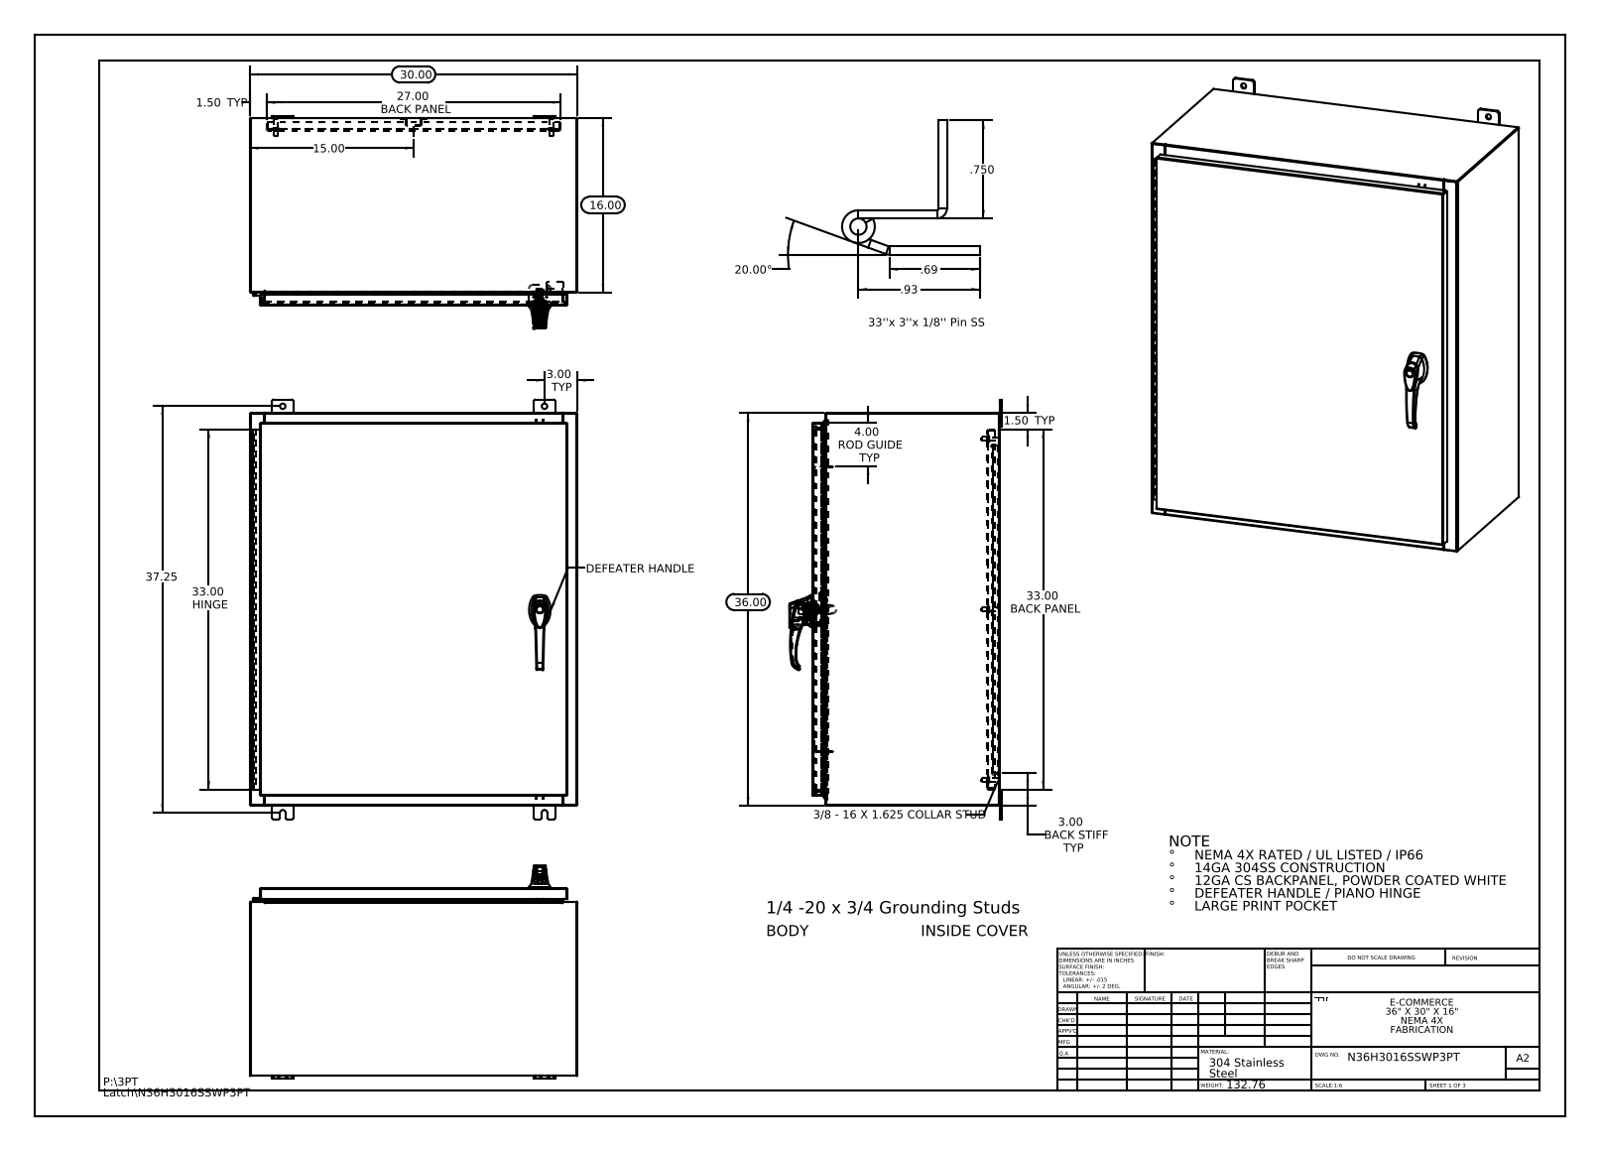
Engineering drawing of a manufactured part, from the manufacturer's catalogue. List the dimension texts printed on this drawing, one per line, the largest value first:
37.25
36.00
33.00 HINGE
33.00 BACK PANEL
30.00
27.00 BACK PANEL
20.00°
16.00
15.00
4.00 ROD GUIDE TYP
3.00 TYP
3.00 BACK STIFF TYP
1.50 TYP
1.50 TYP
.93
.750
.69
